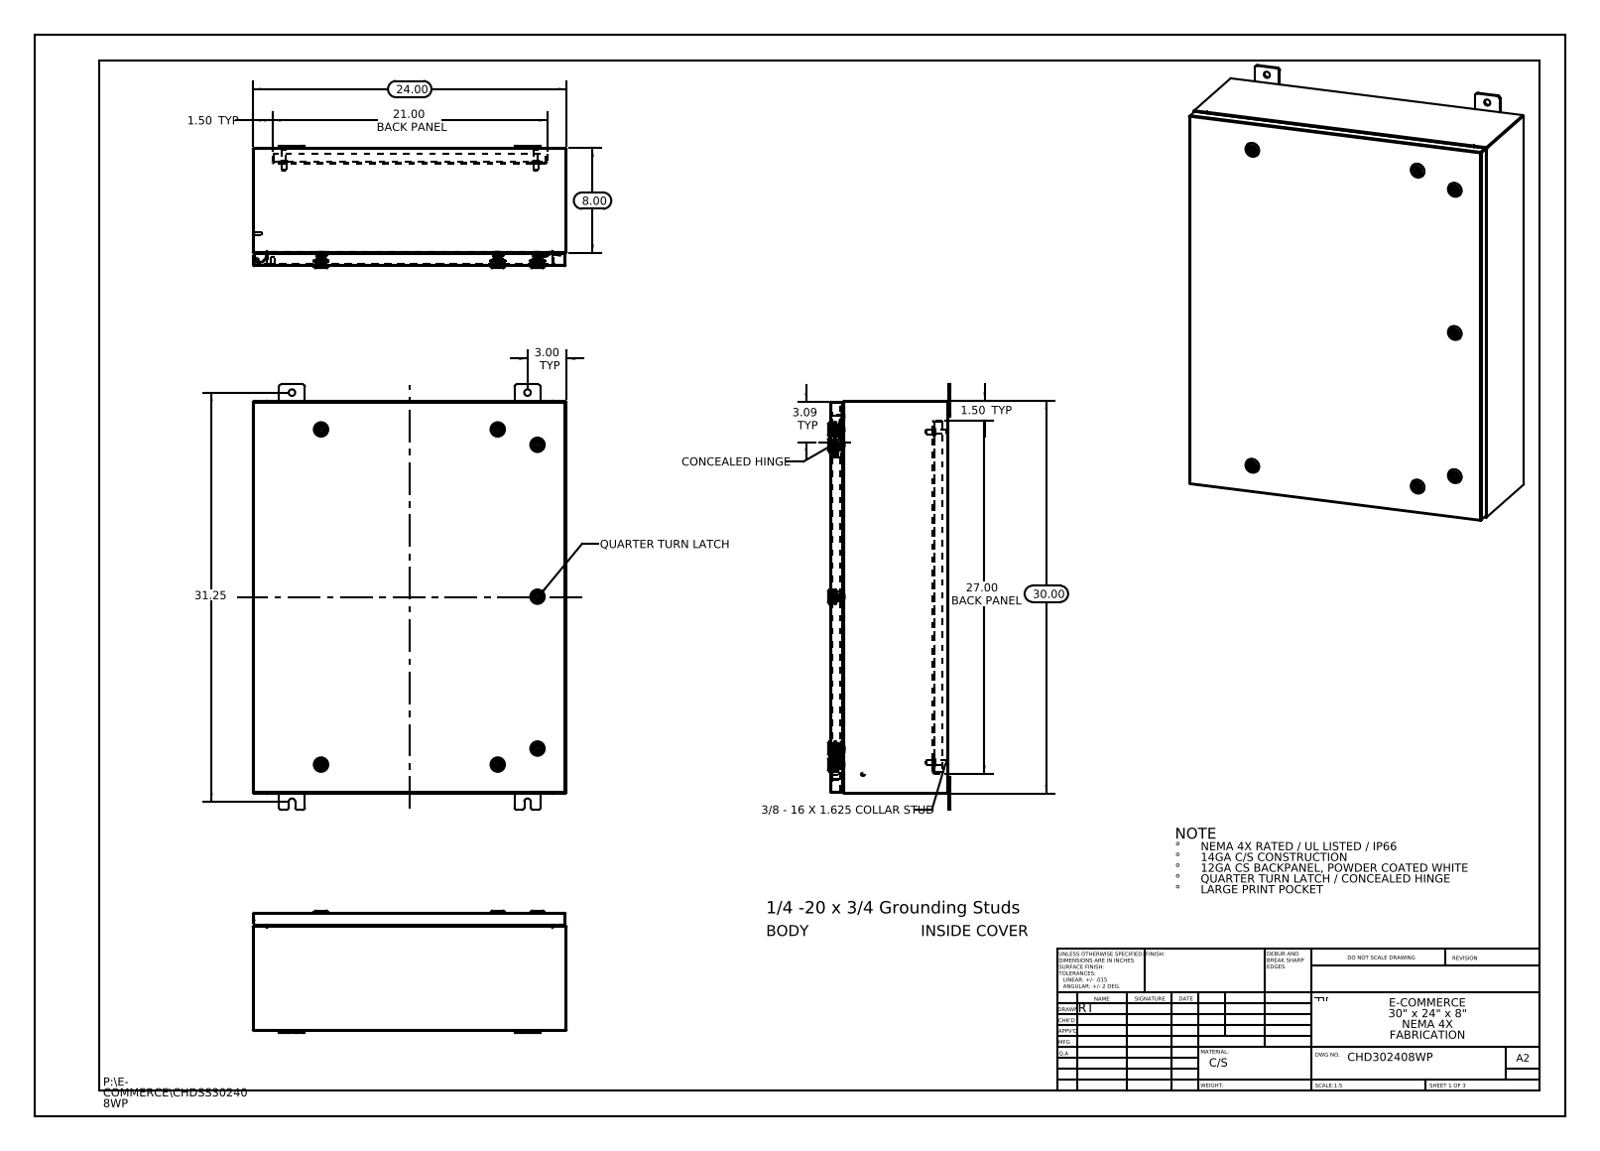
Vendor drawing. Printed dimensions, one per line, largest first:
31.25
30.00
27.00 BACK PANEL
24.00
21.00 BACK PANEL
8.00
3.09 TYP
3.00 TYP
1.50 TYP
1.50 TYP
